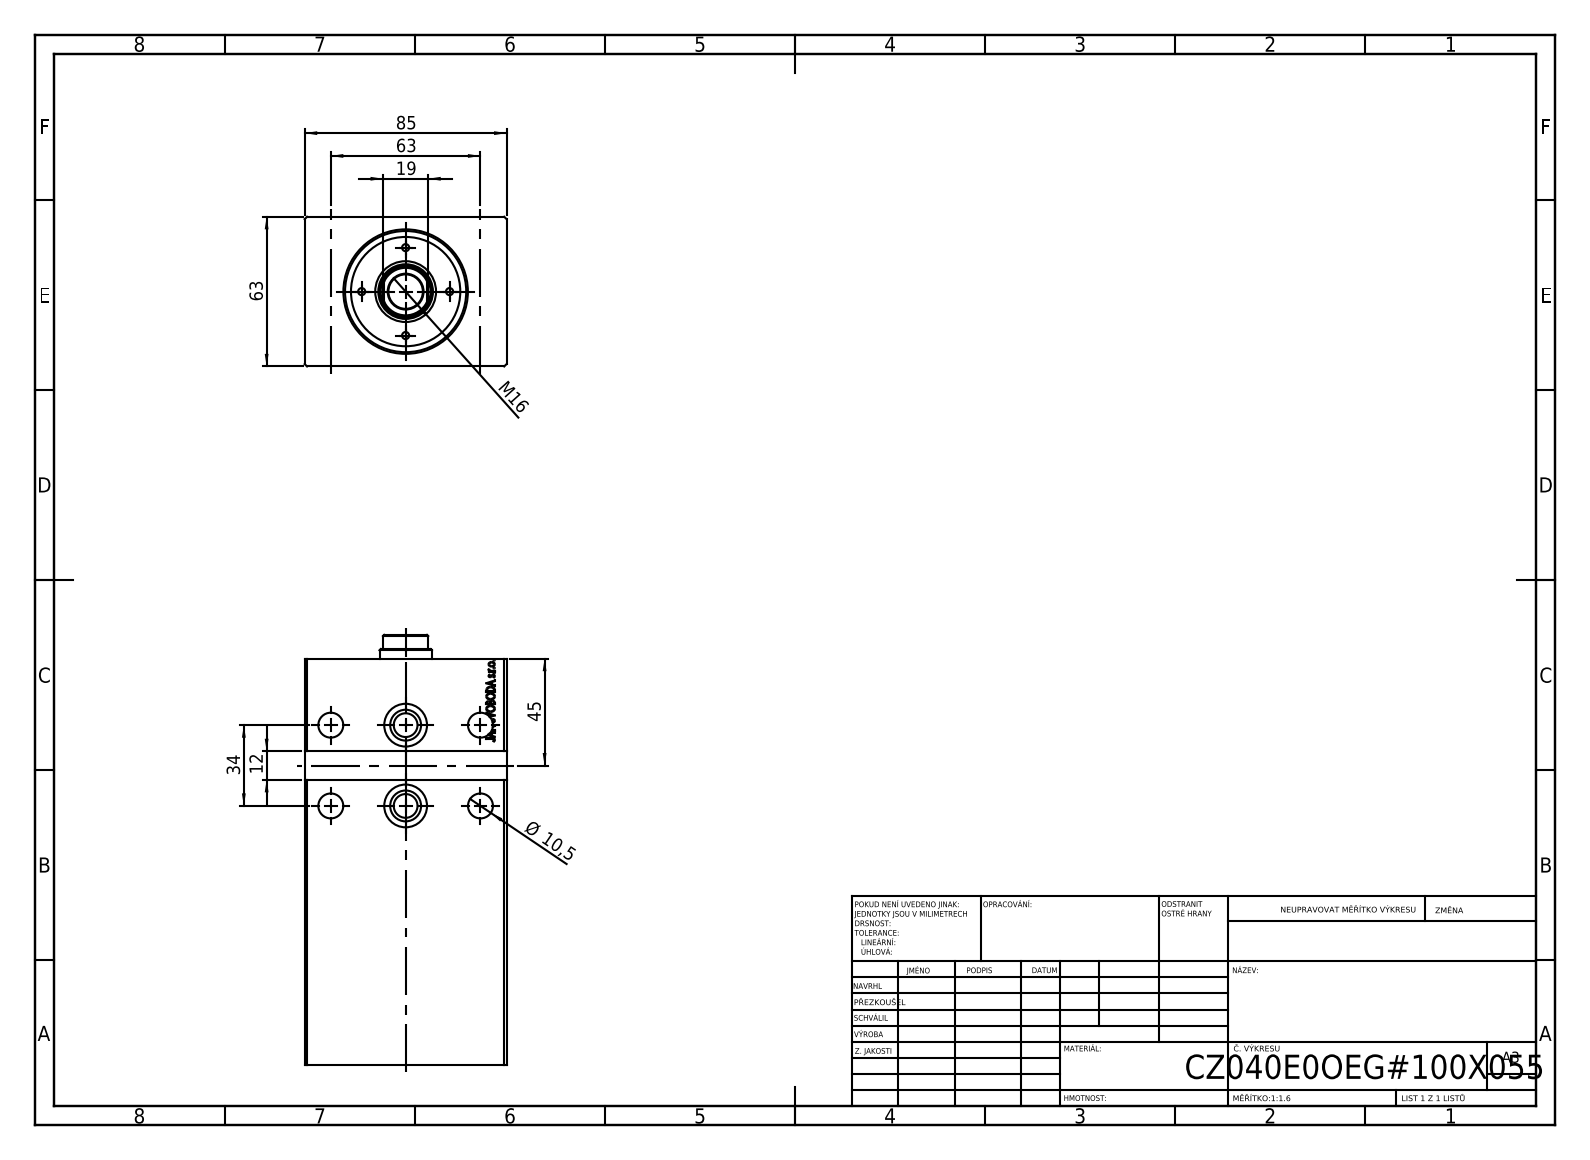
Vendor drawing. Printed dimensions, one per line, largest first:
85
63
63
45
34
19
M16
12
Ø 10,5
